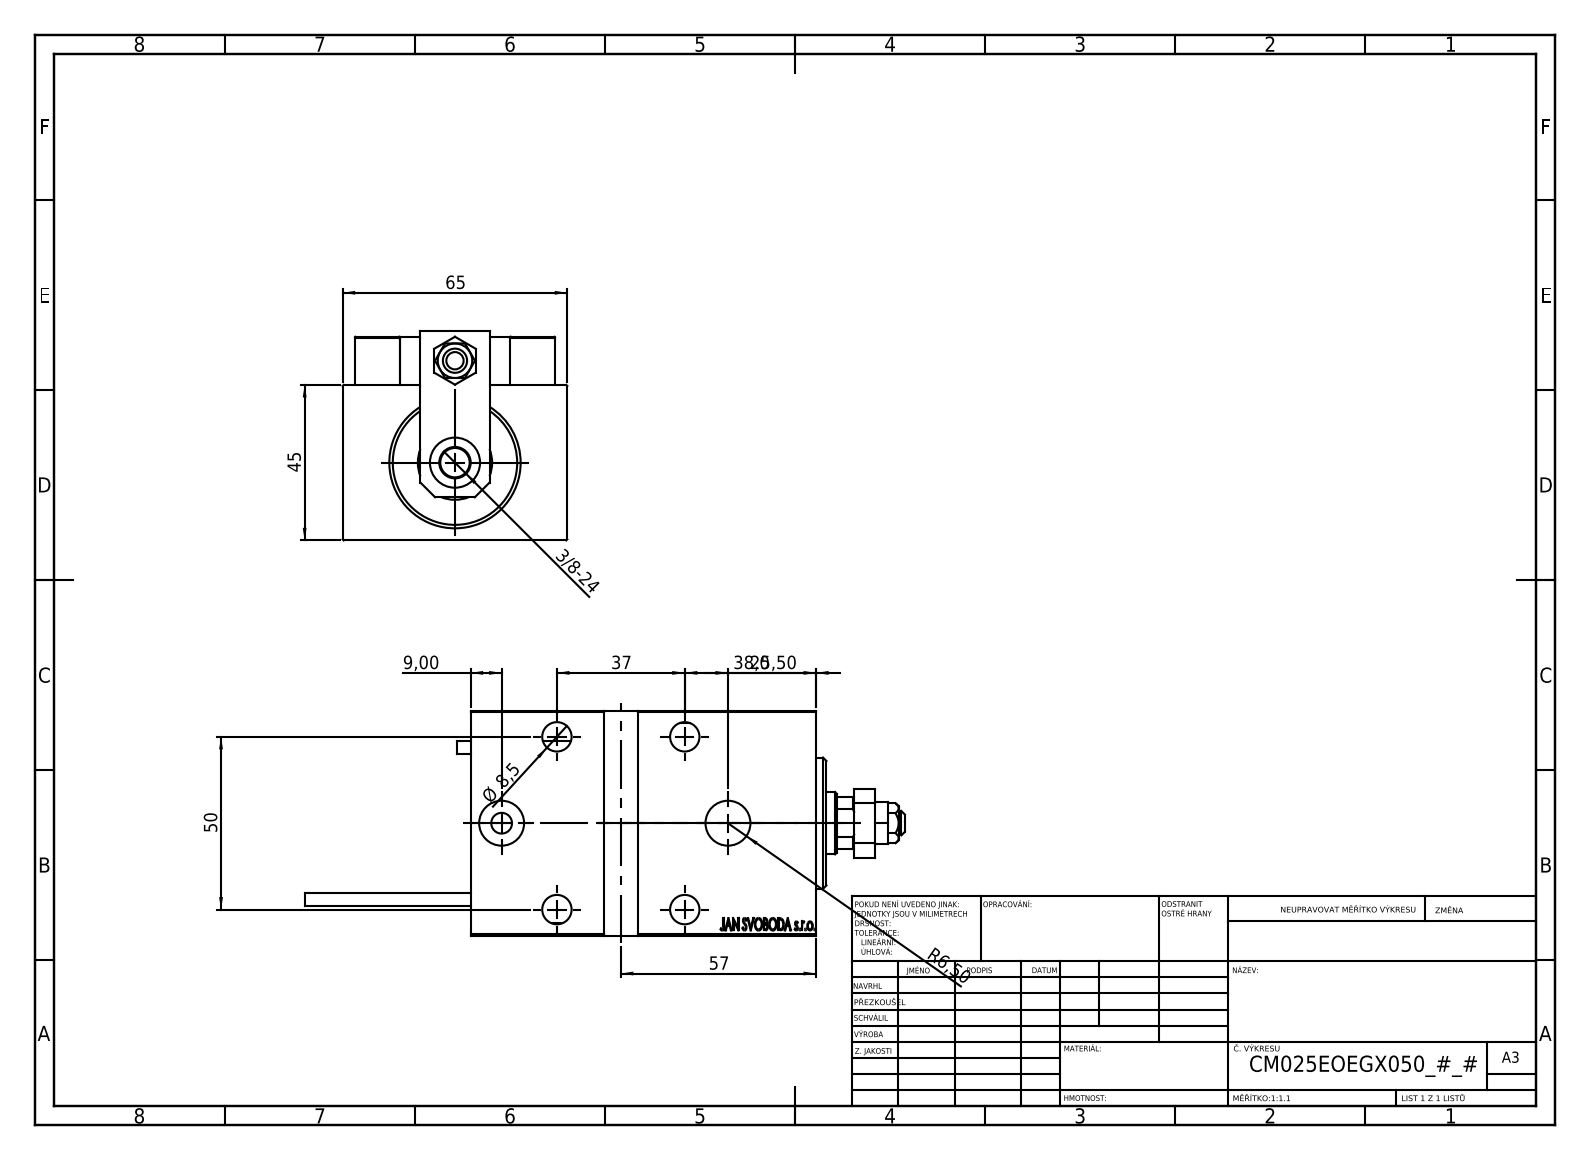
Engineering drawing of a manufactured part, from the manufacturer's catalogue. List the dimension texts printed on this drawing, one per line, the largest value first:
65
57
50
45
38,0
37
25,50
9,00
Ø 8,5
R6,50
3/8-24
